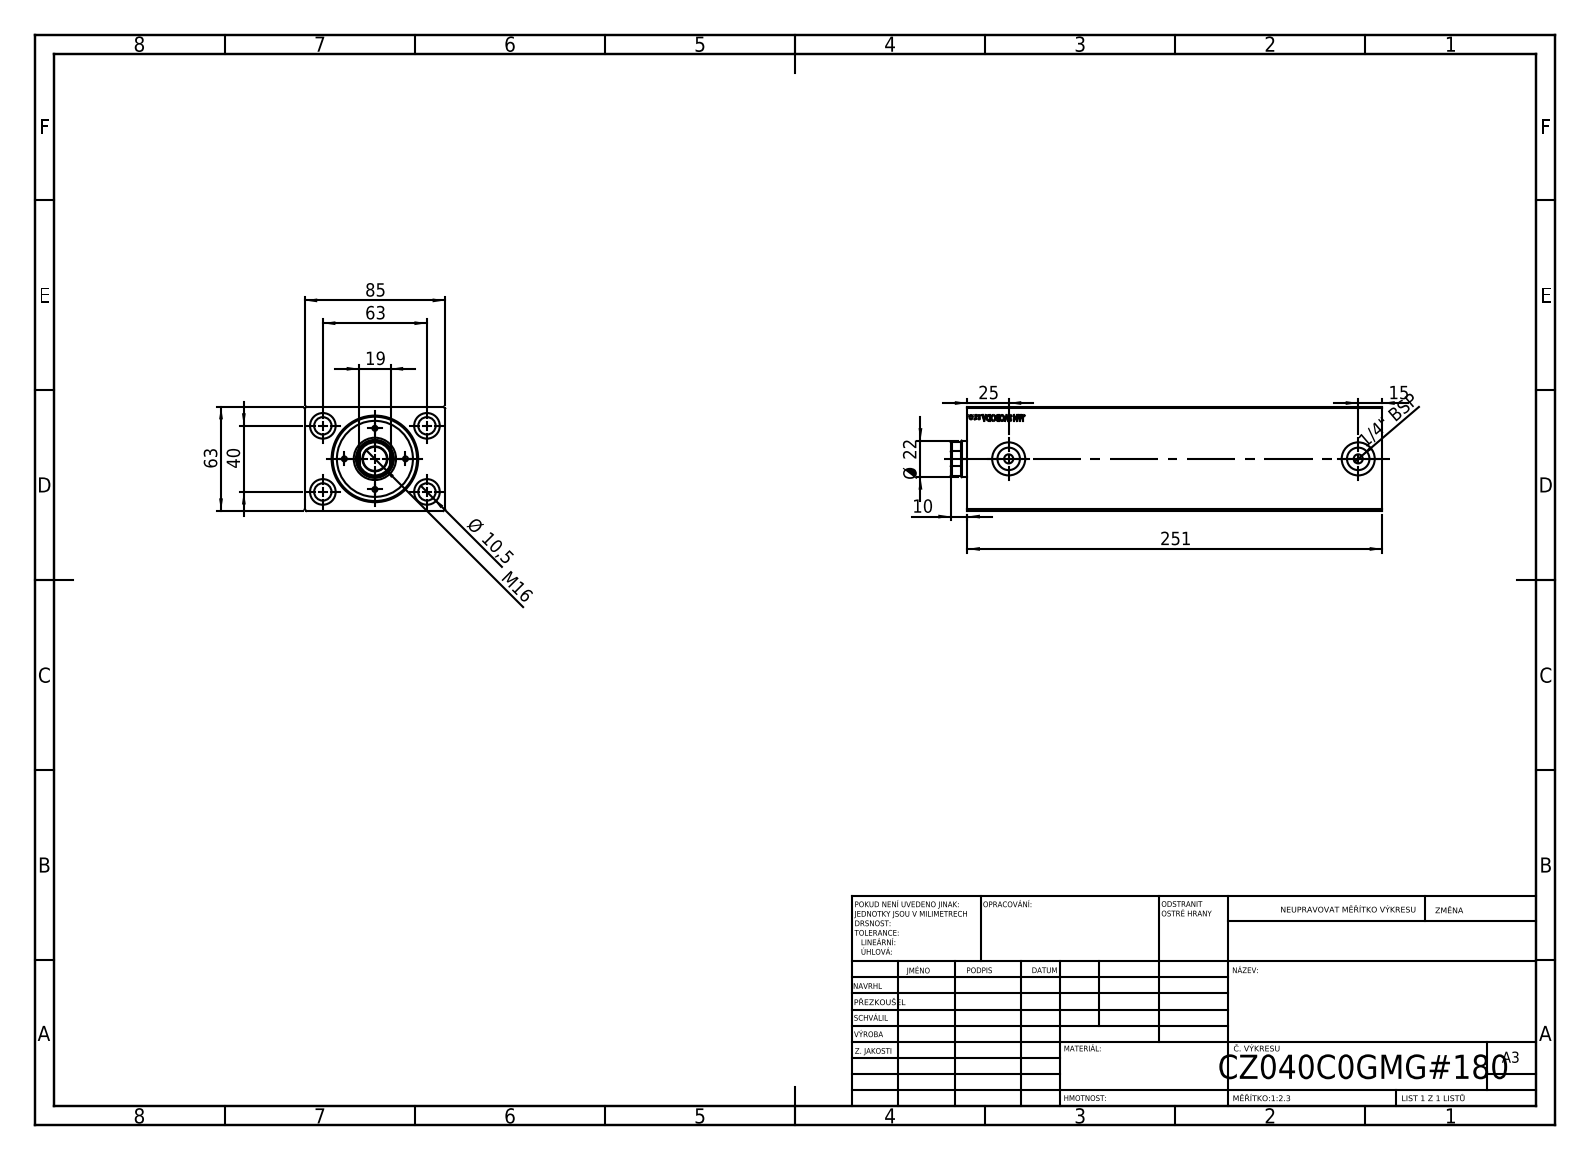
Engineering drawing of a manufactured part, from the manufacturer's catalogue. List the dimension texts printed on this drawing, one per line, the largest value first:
251
85
63
63
40
25
Ø 22
19
M16
15
Ø 10,5
10
1/4" BSP
